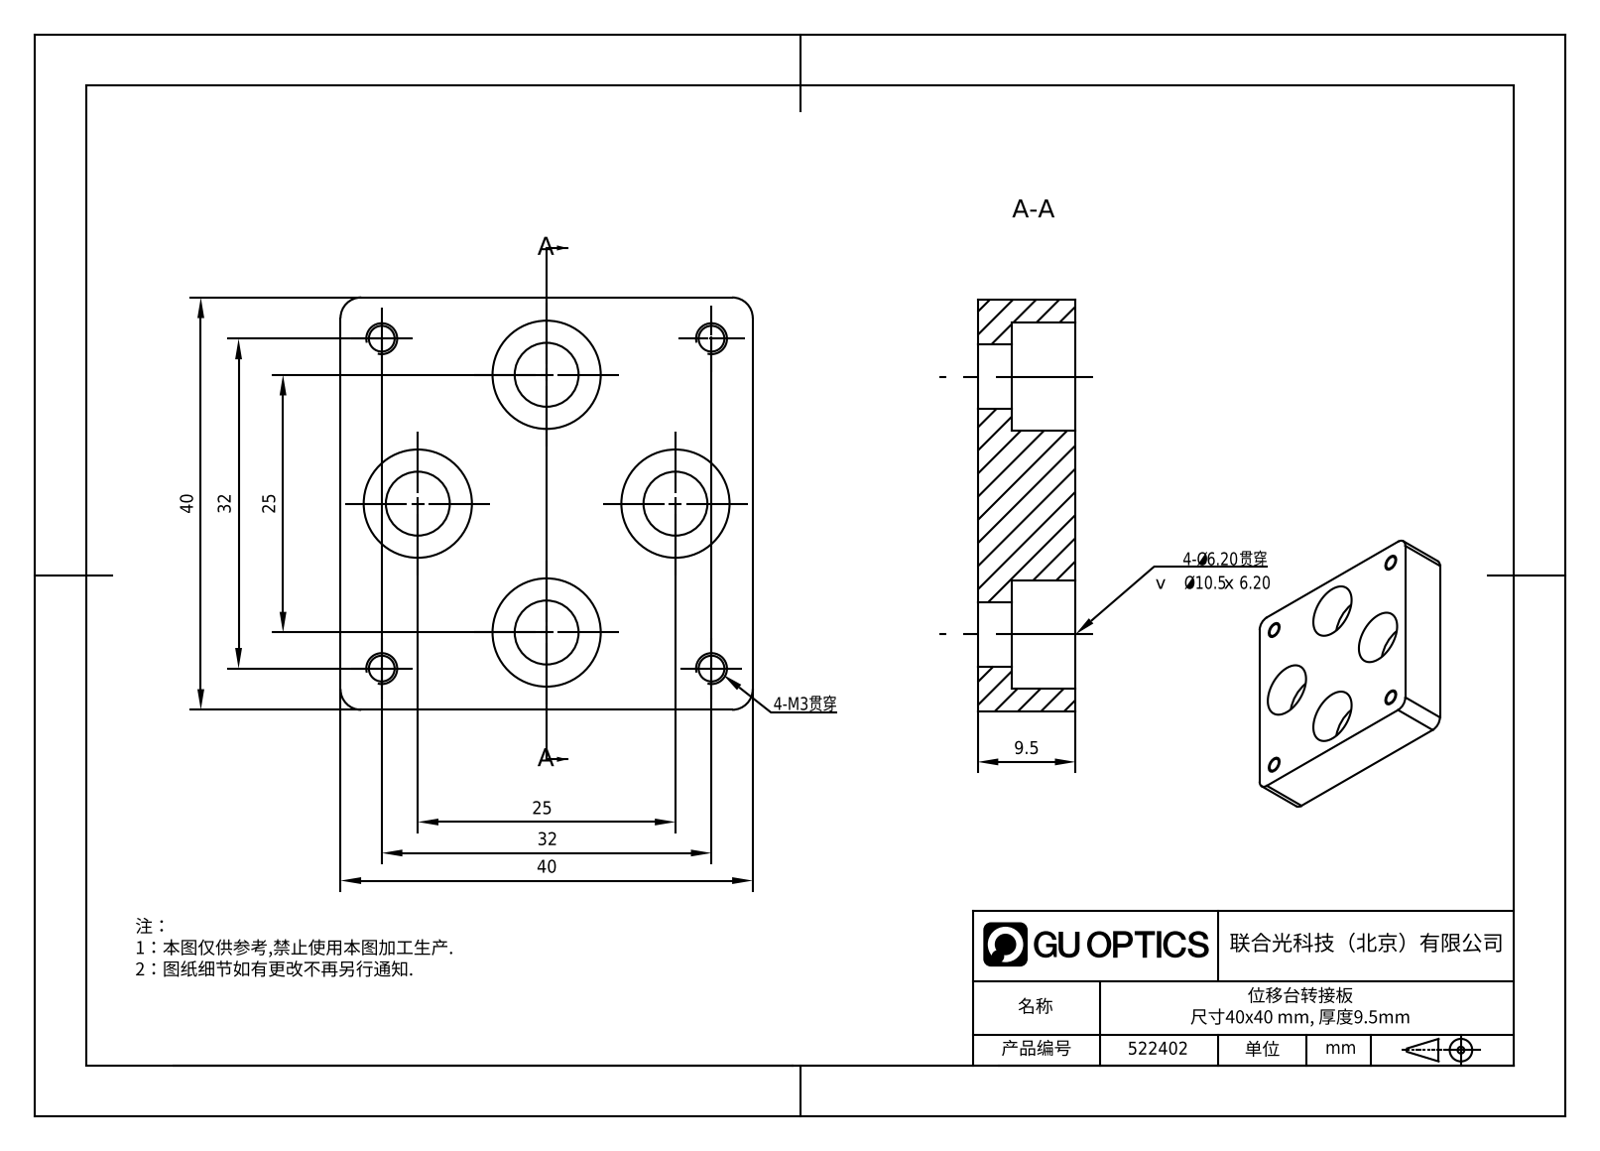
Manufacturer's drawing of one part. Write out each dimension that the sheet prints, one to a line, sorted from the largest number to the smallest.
40
40
32
32
25
25
9.5
